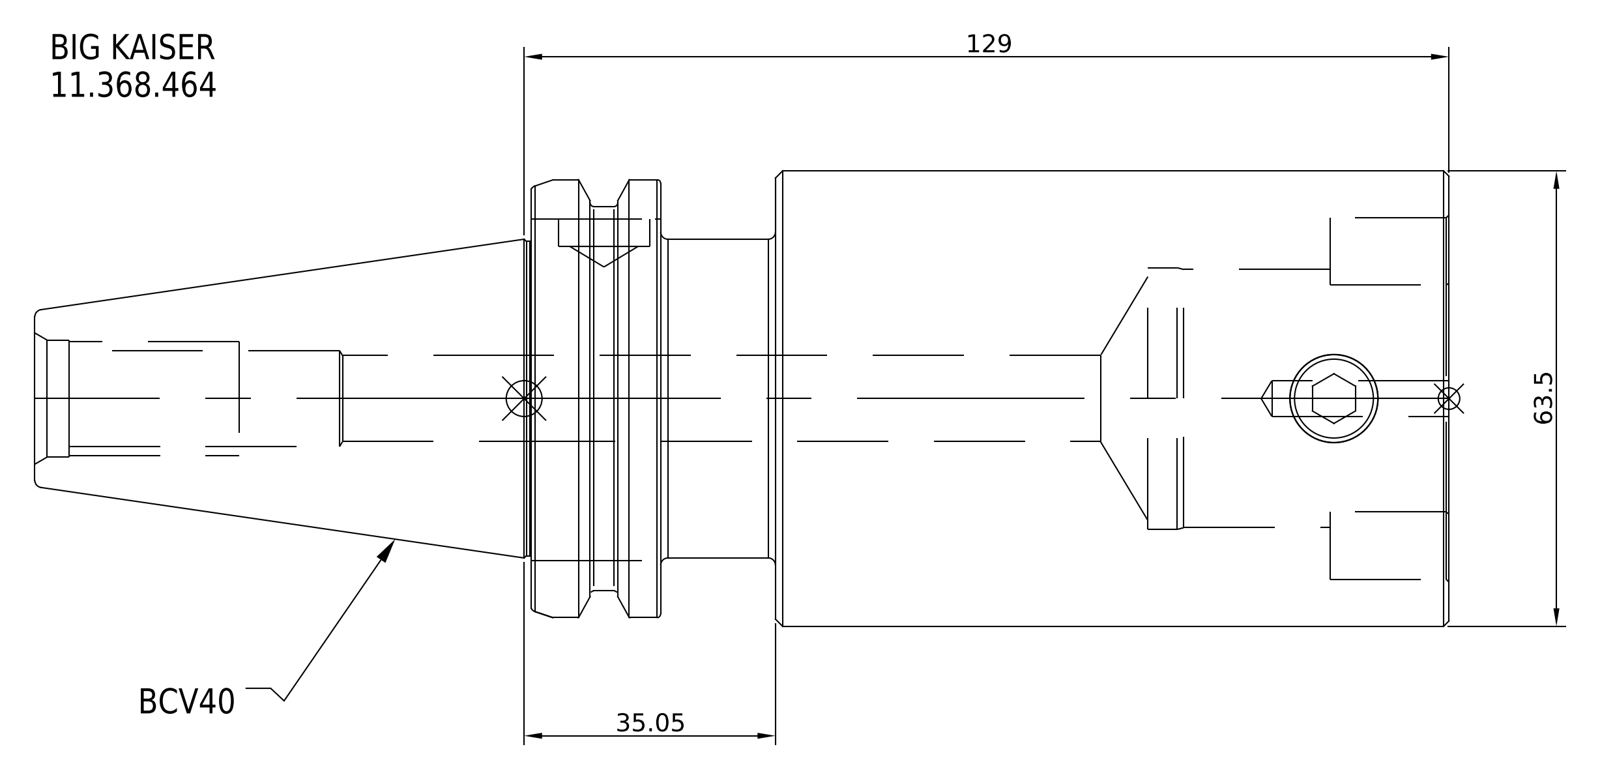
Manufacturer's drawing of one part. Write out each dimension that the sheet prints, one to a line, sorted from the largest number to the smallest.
129
63.5
35.05
